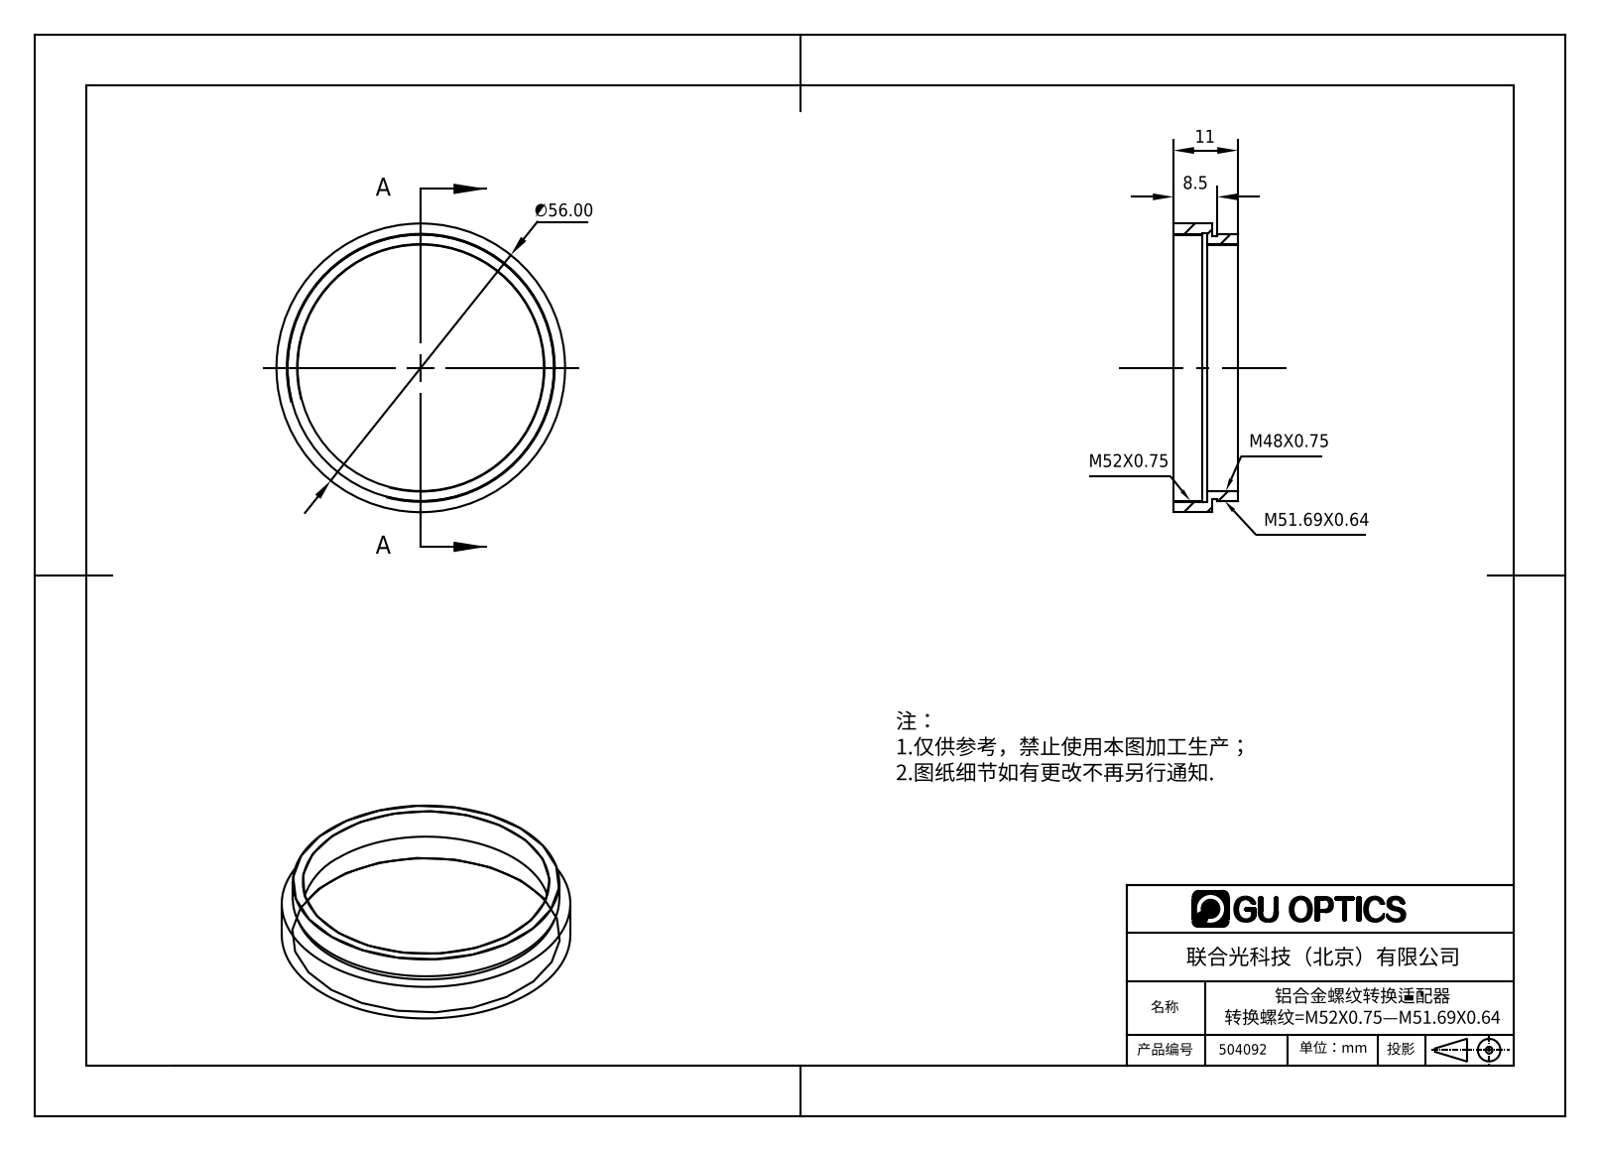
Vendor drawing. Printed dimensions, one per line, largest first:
∅56.00
11
8.5
